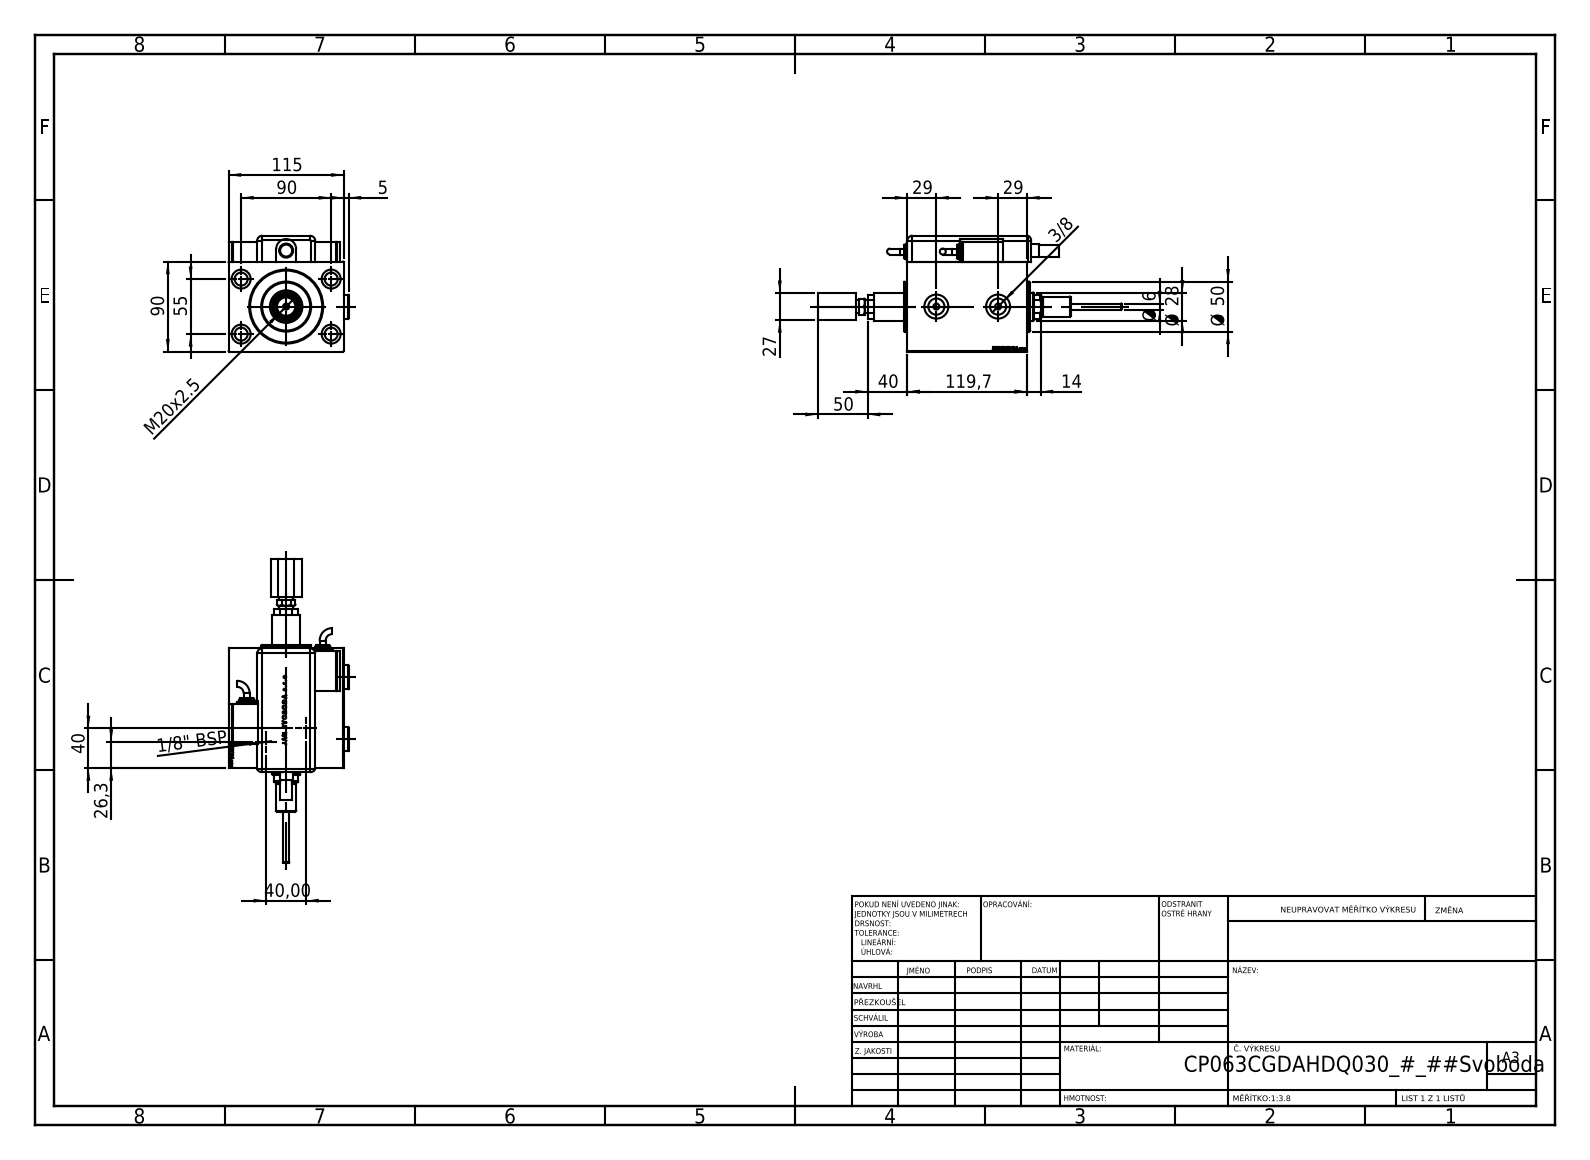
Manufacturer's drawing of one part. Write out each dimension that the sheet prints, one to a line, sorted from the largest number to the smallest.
119,7
115
90
90
55
Ø 50
50
40
40,00
40
29
29
Ø 28
27
26,3
M20x2.5
14
Ø 6
5
3/8
1/8" BSP
